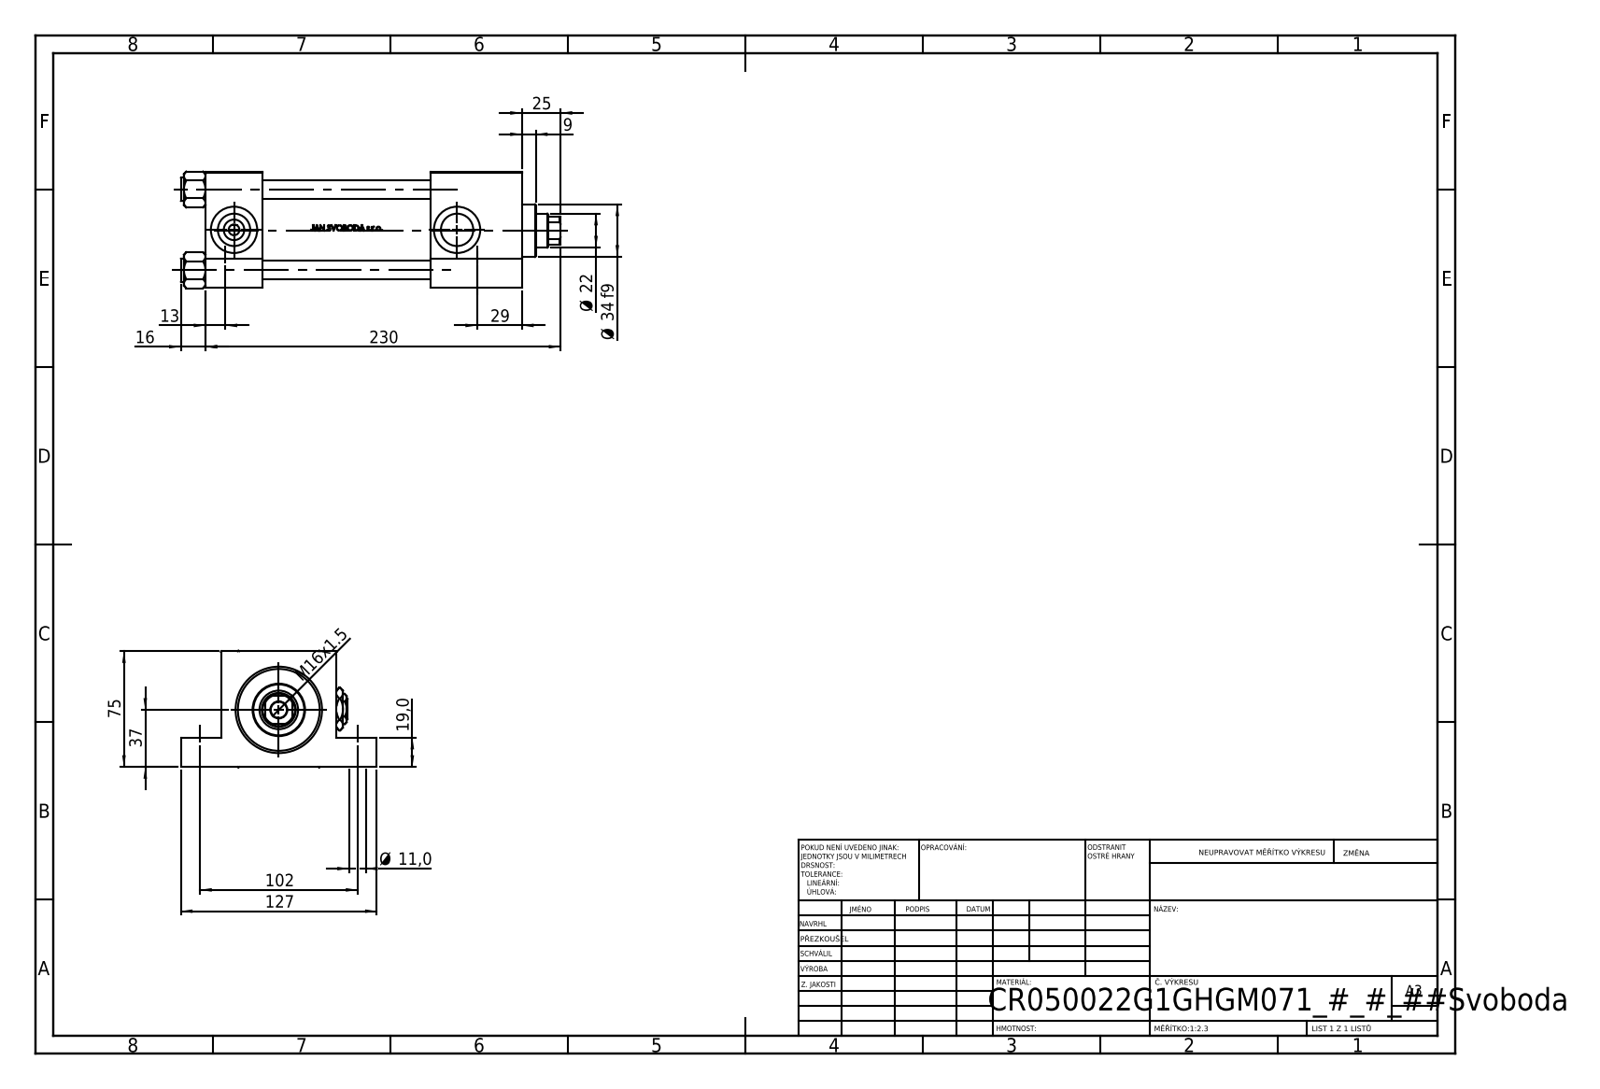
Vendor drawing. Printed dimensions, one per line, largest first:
230
127
102
75
37
Ø 34 f9
29
25
Ø 22
19,0
16
M16x1.5
13
Ø 11,0
9
